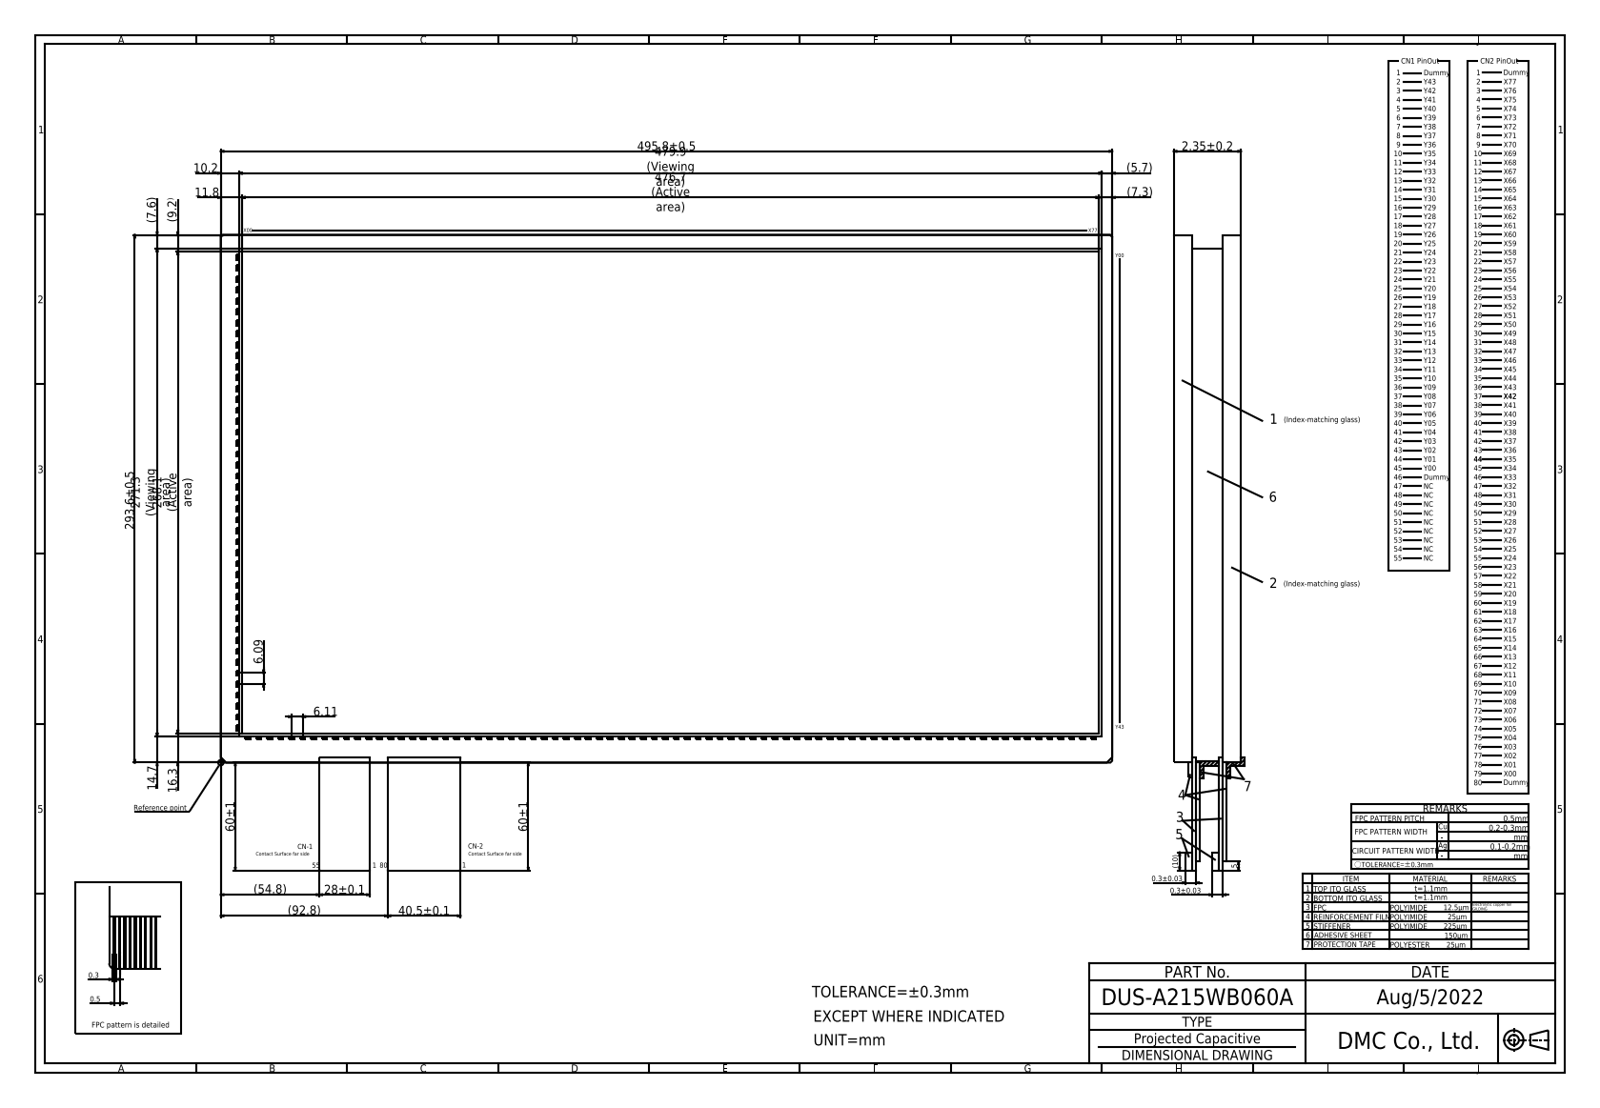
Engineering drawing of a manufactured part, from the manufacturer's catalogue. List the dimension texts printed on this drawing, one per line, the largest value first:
495.8±0.5
479.9 (Viewing area)
476.7 (Active area)
293.6±0.5
271.3 (Viewing area)
268.1 (Active area)
(92.8)
60±1
60±1
(54.8)
40.5±0.1
28±0.1
16.3
14.7
11.8
10.2
(10)
(9.2)
(7.6)
(7.3)
6.11
6.09
(5.7)
5
2.35±0.2
0.5
0.3
0.3±0.03
0.3±0.03
